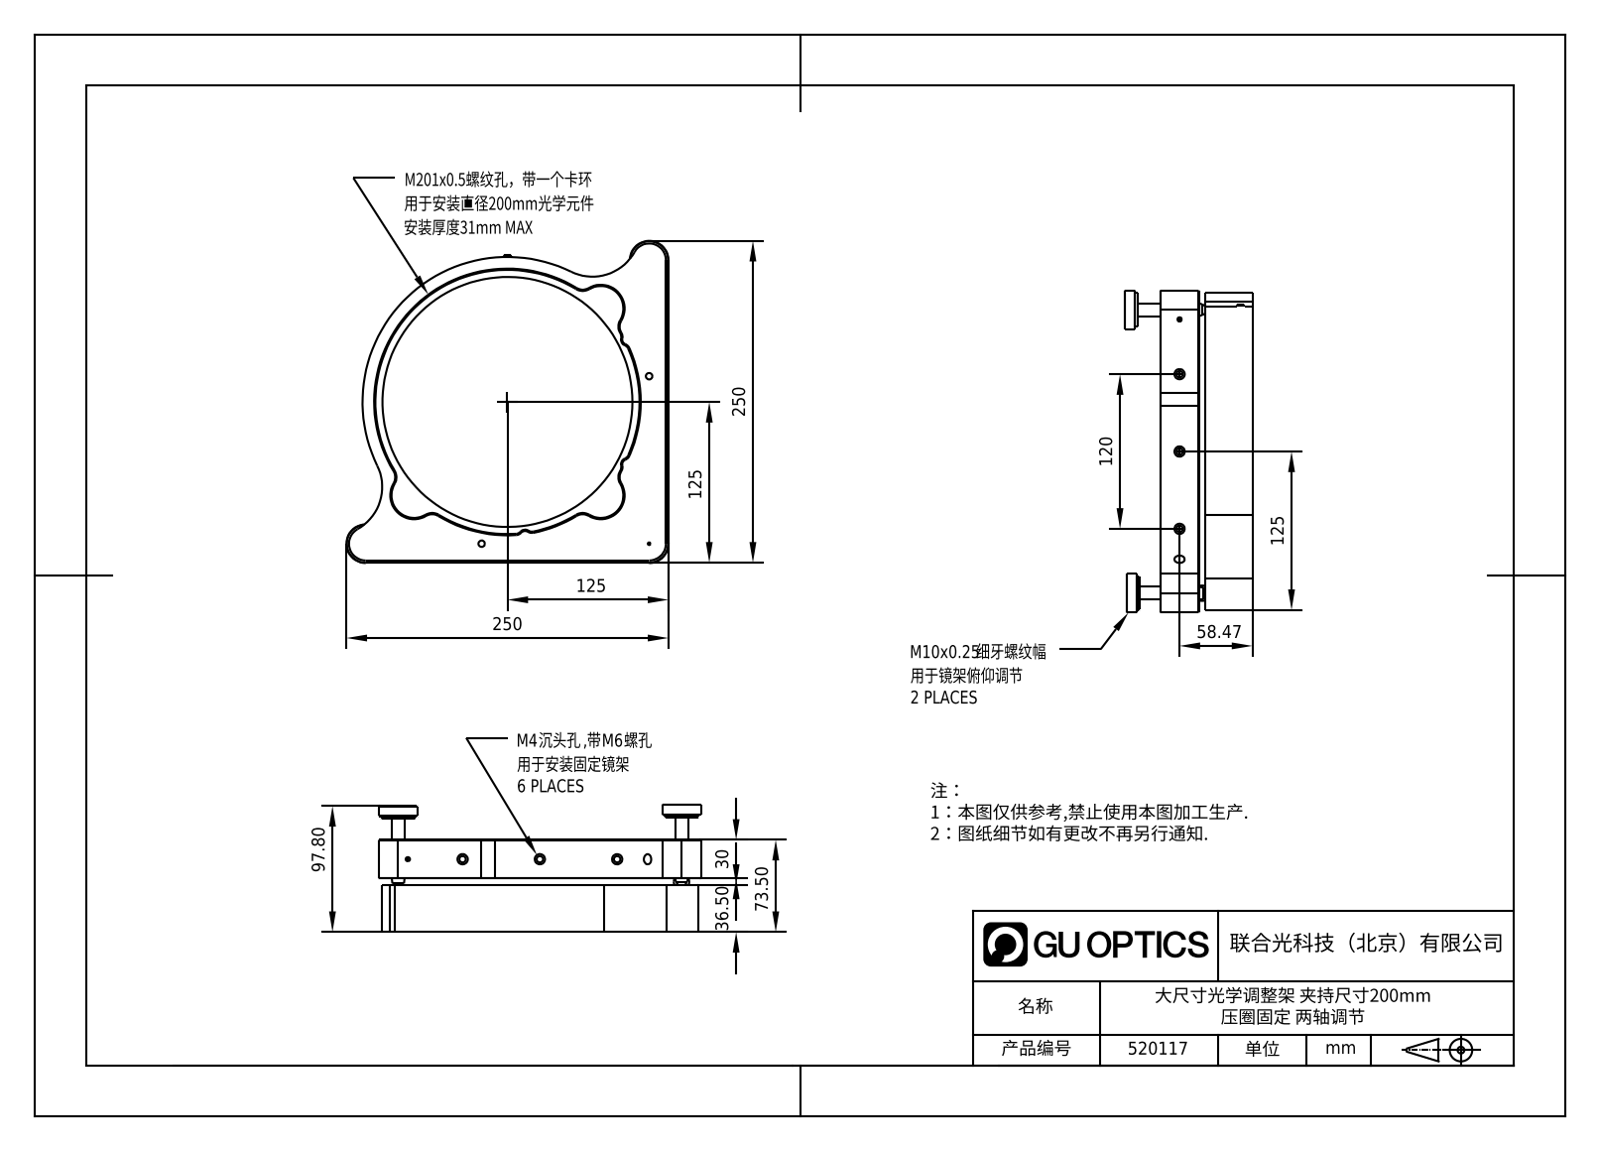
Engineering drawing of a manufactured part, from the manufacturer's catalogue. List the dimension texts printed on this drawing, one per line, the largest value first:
250
250
125
125
125
120
97.80
73.50
58.47
36.50
30
